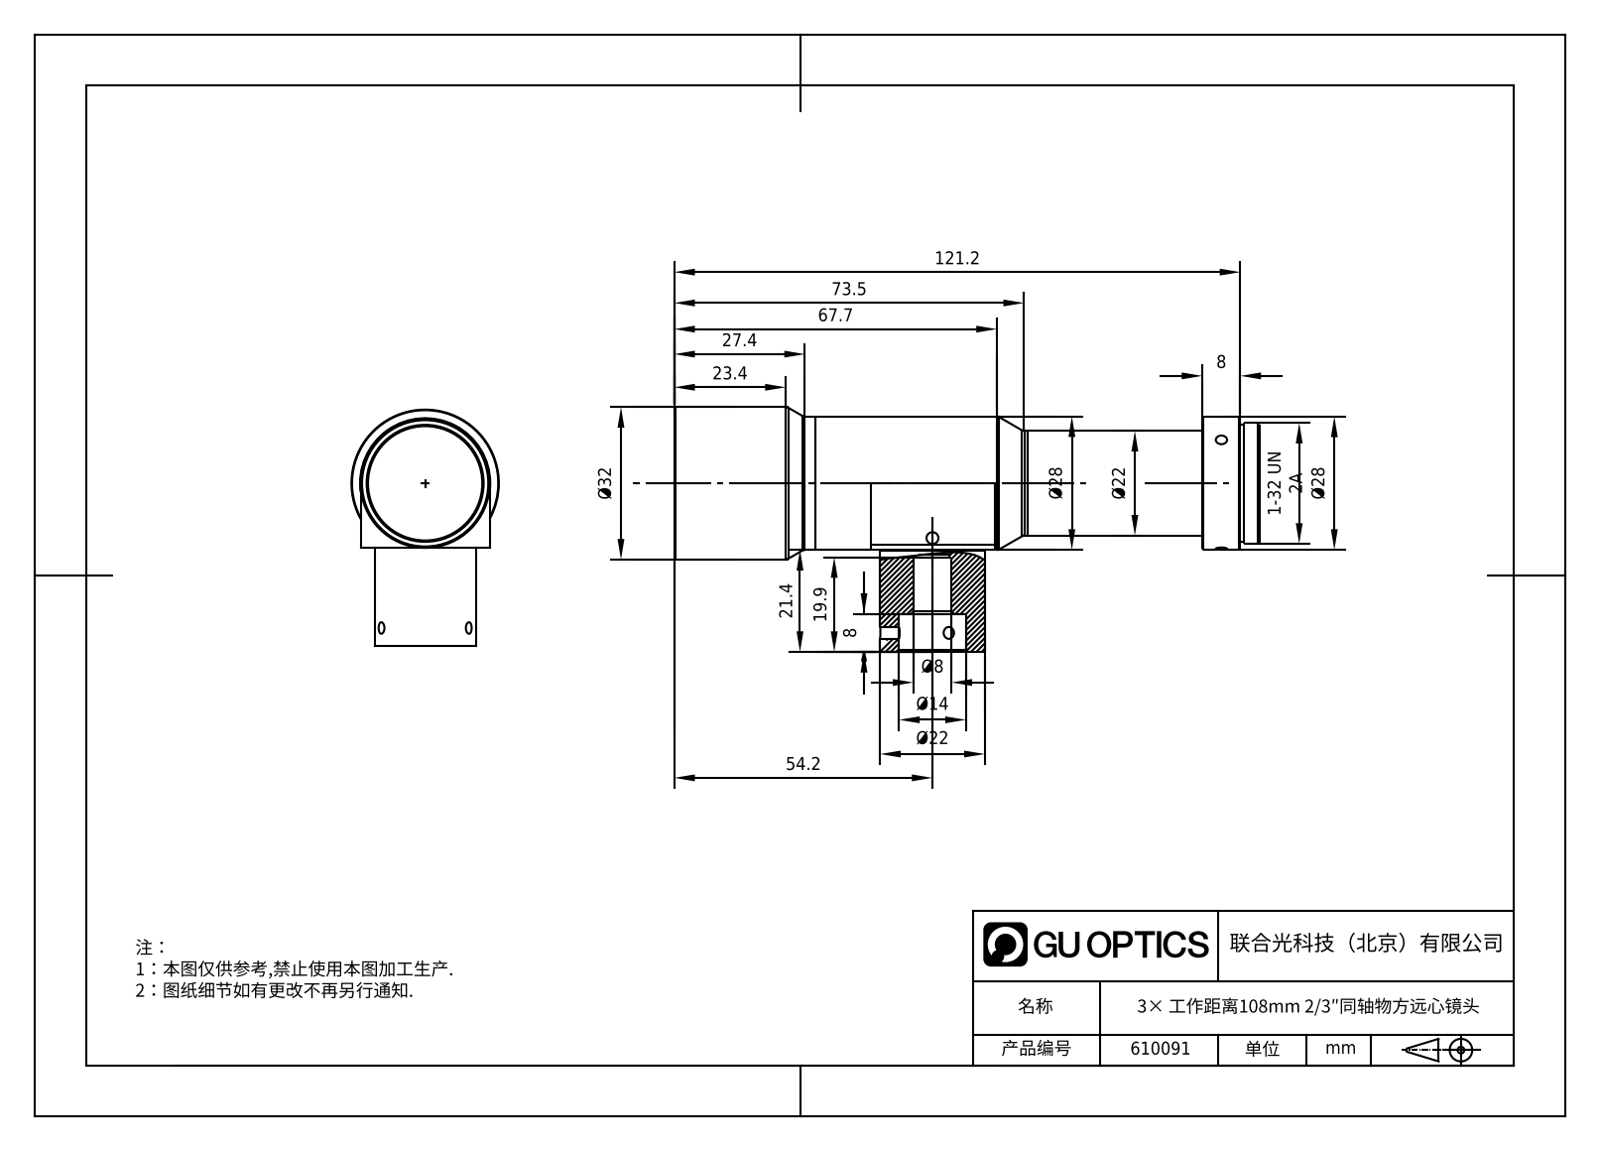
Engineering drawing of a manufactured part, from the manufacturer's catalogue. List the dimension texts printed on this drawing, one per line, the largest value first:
121.2
73.5
67.7
54.2
Ø32
Ø28
Ø28
27.4
23.4
Ø22
Ø22
21.4
19.9
Ø14
Ø8
8
8
1-32 UN 2A
